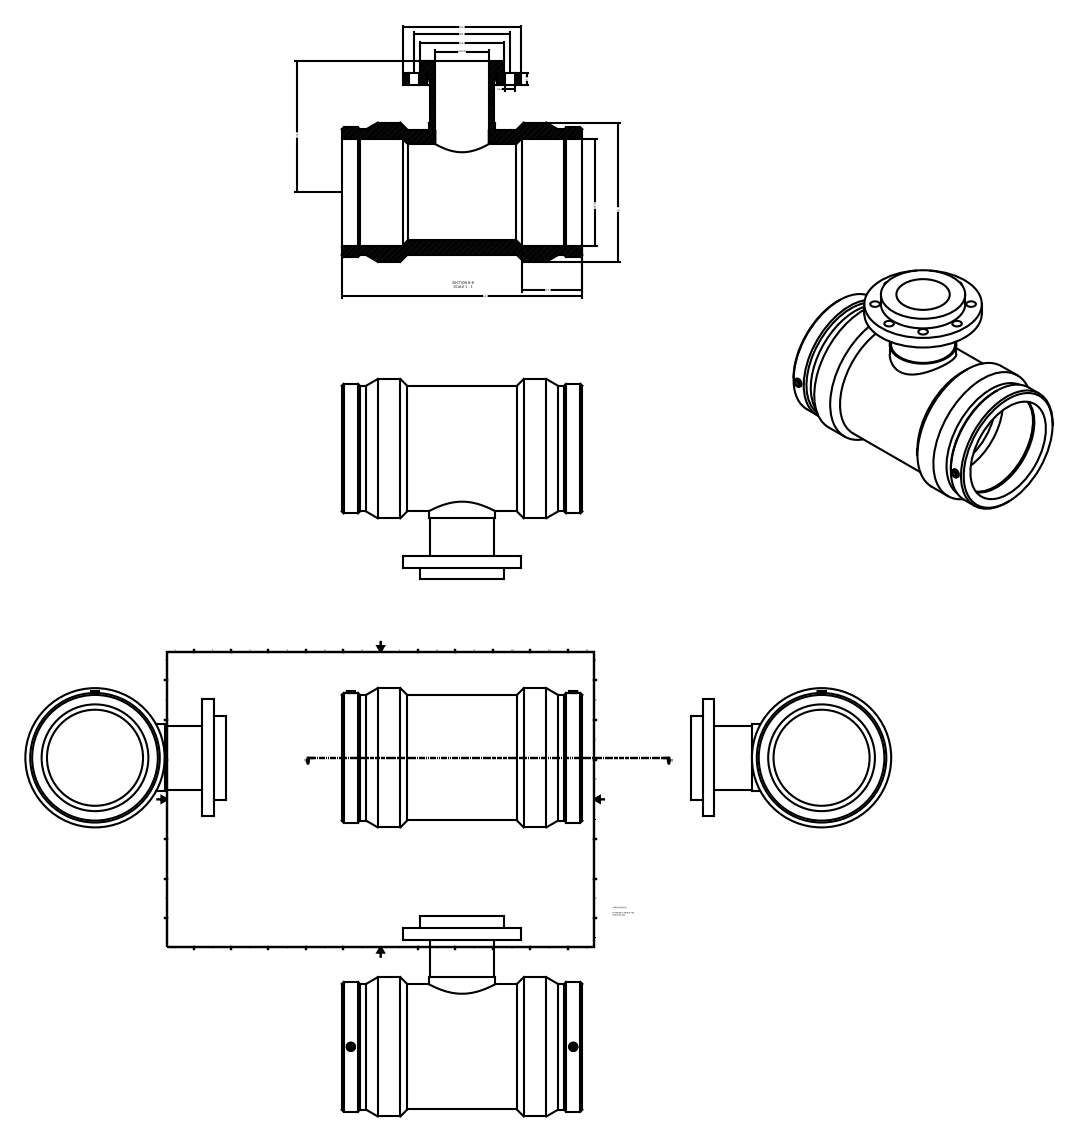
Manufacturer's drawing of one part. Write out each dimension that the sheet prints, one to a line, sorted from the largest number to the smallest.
451.00
261.00
245.00
220.00
n200.00
180.00
158.00
114.00
n100.00
22.00
18.00
